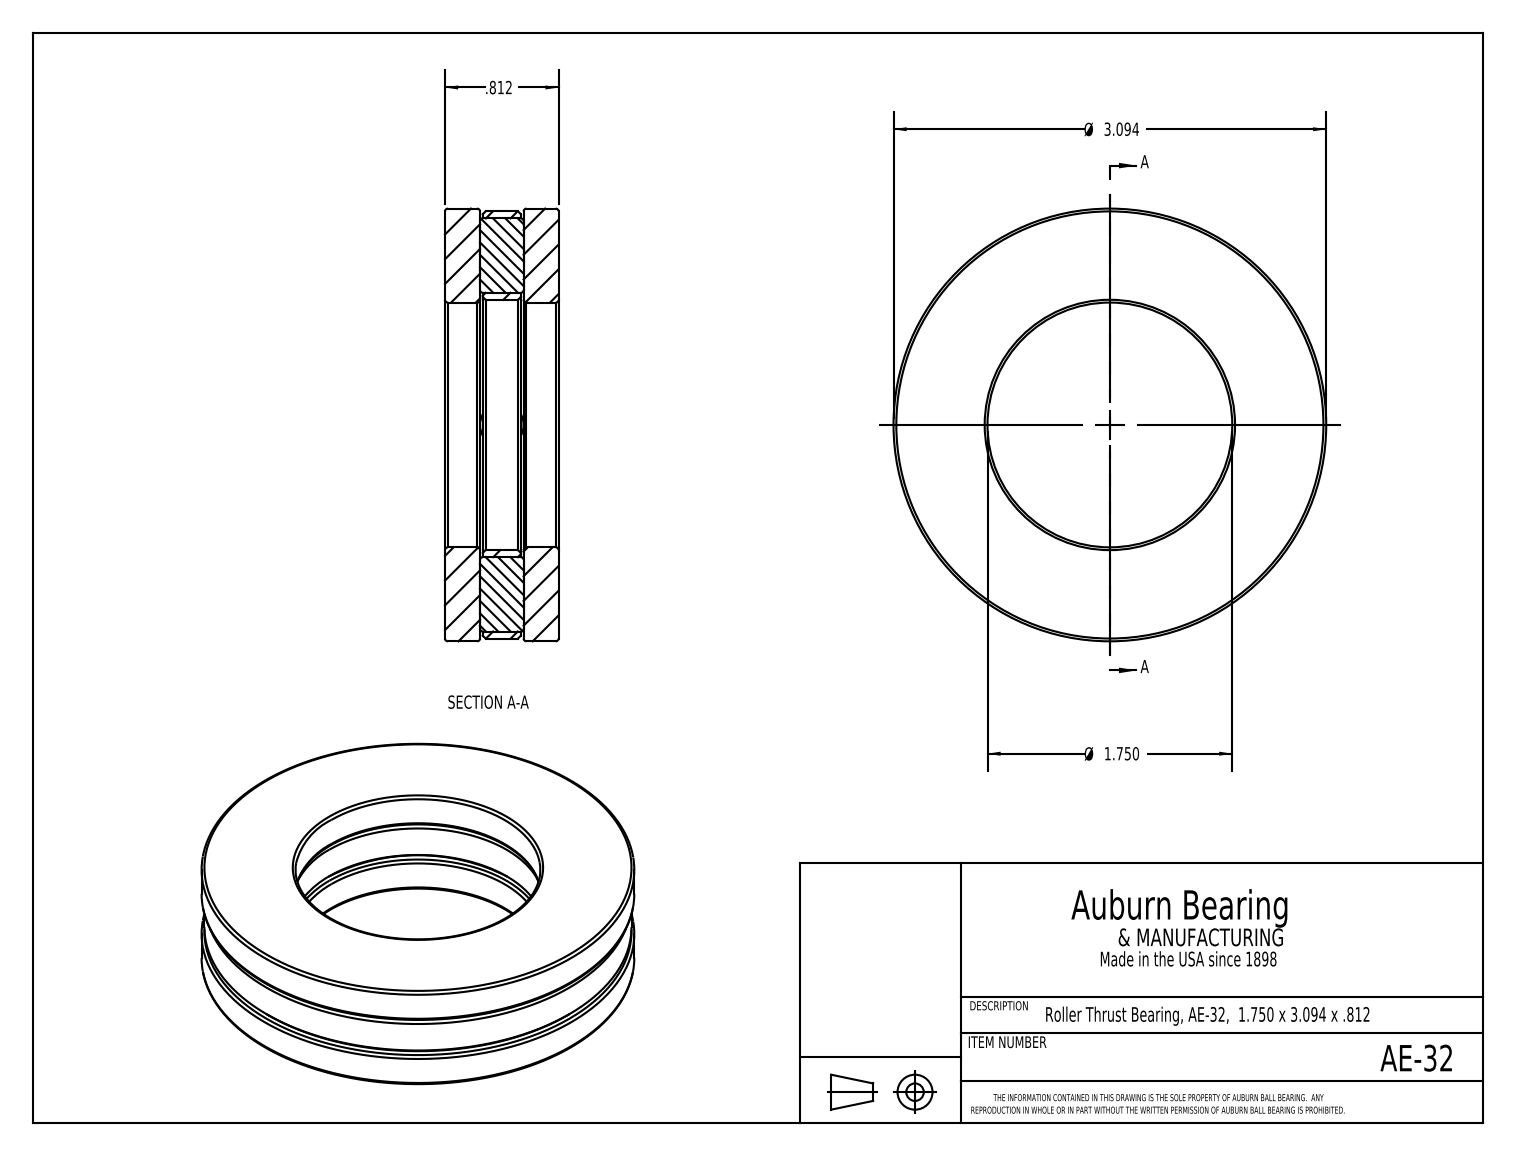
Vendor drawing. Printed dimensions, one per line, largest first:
Ø 3.094
Ø 1.750
.812
